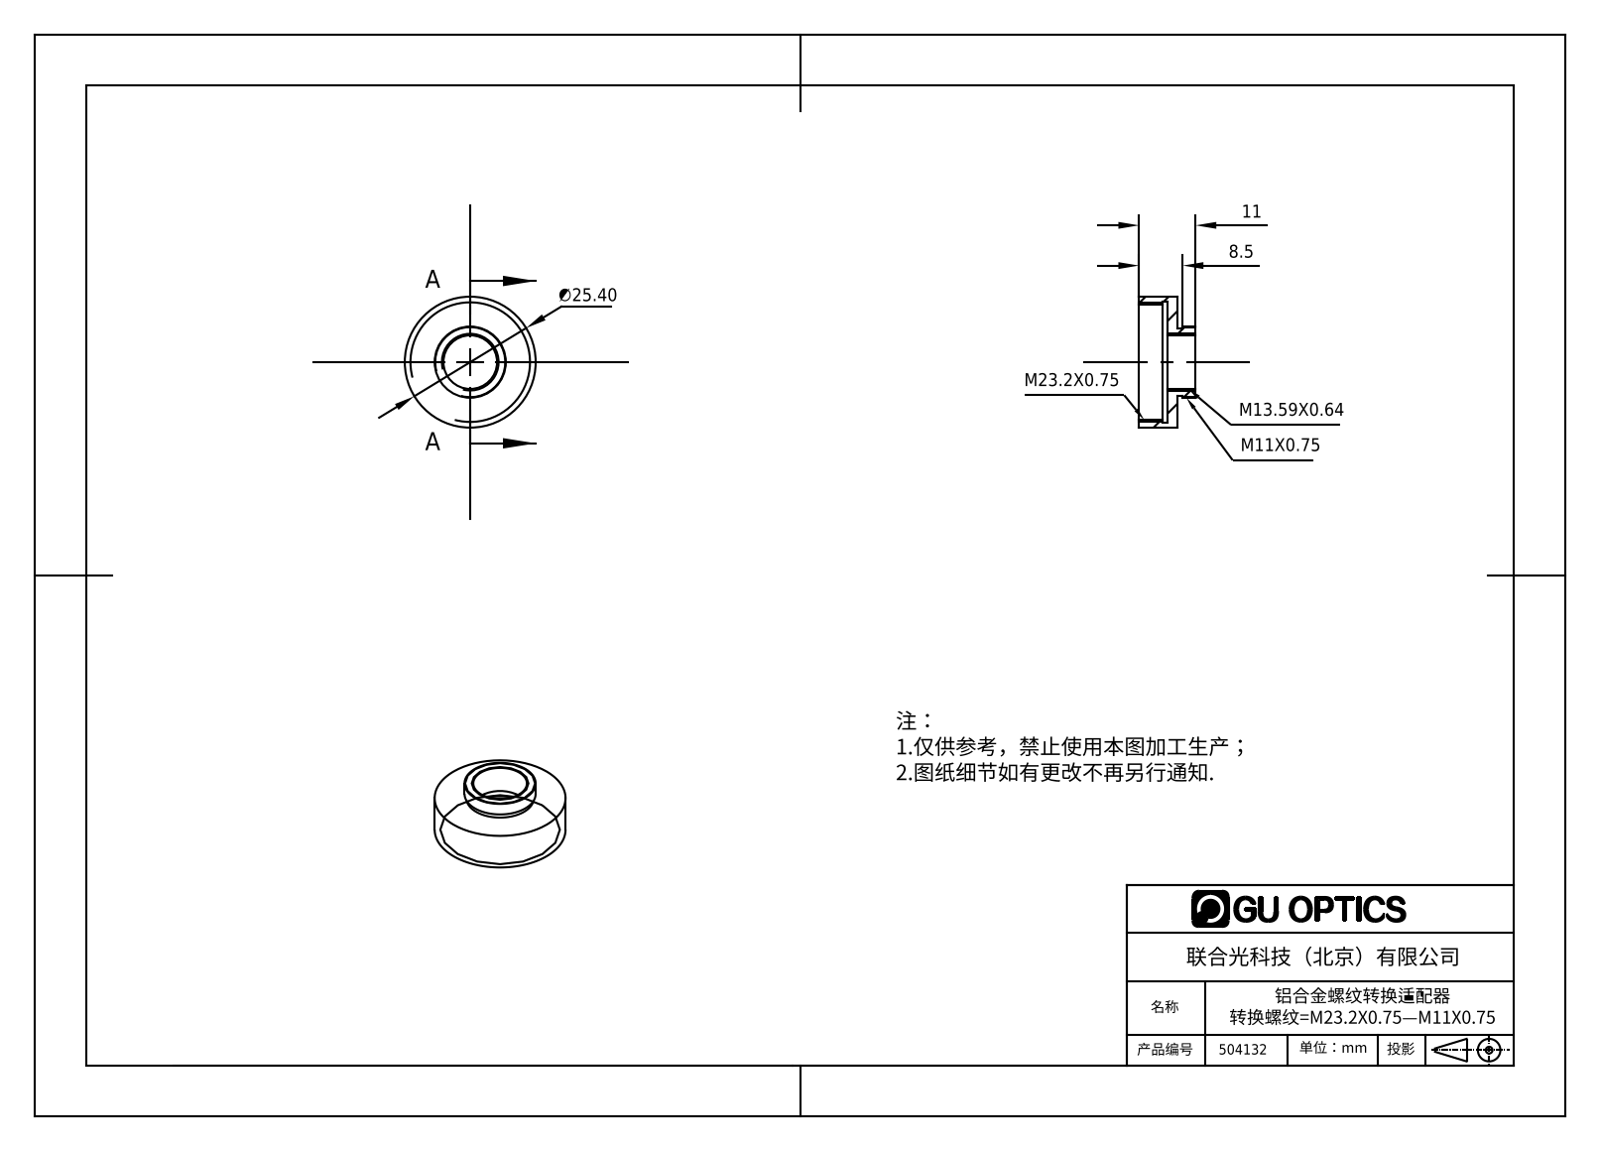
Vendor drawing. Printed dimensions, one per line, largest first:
∅25.40
11
8.5
